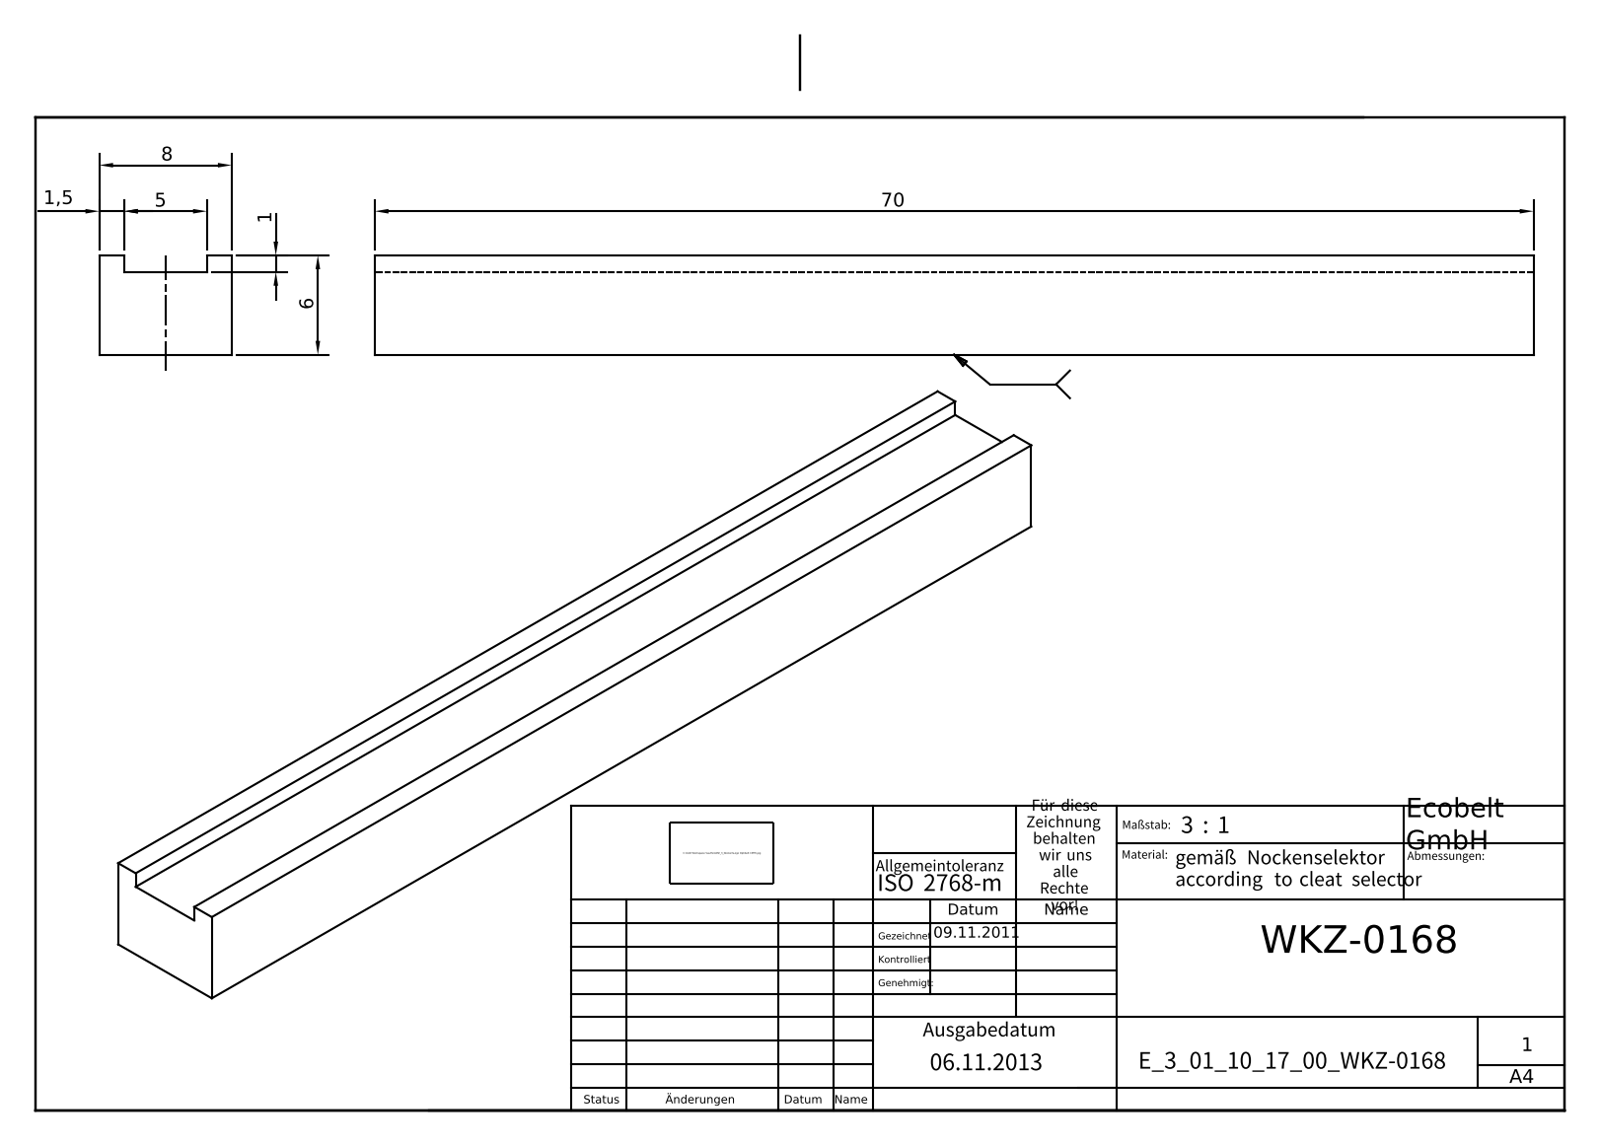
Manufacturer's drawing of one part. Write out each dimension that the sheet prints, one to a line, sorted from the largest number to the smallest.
70
8
6
5
1,5
1
